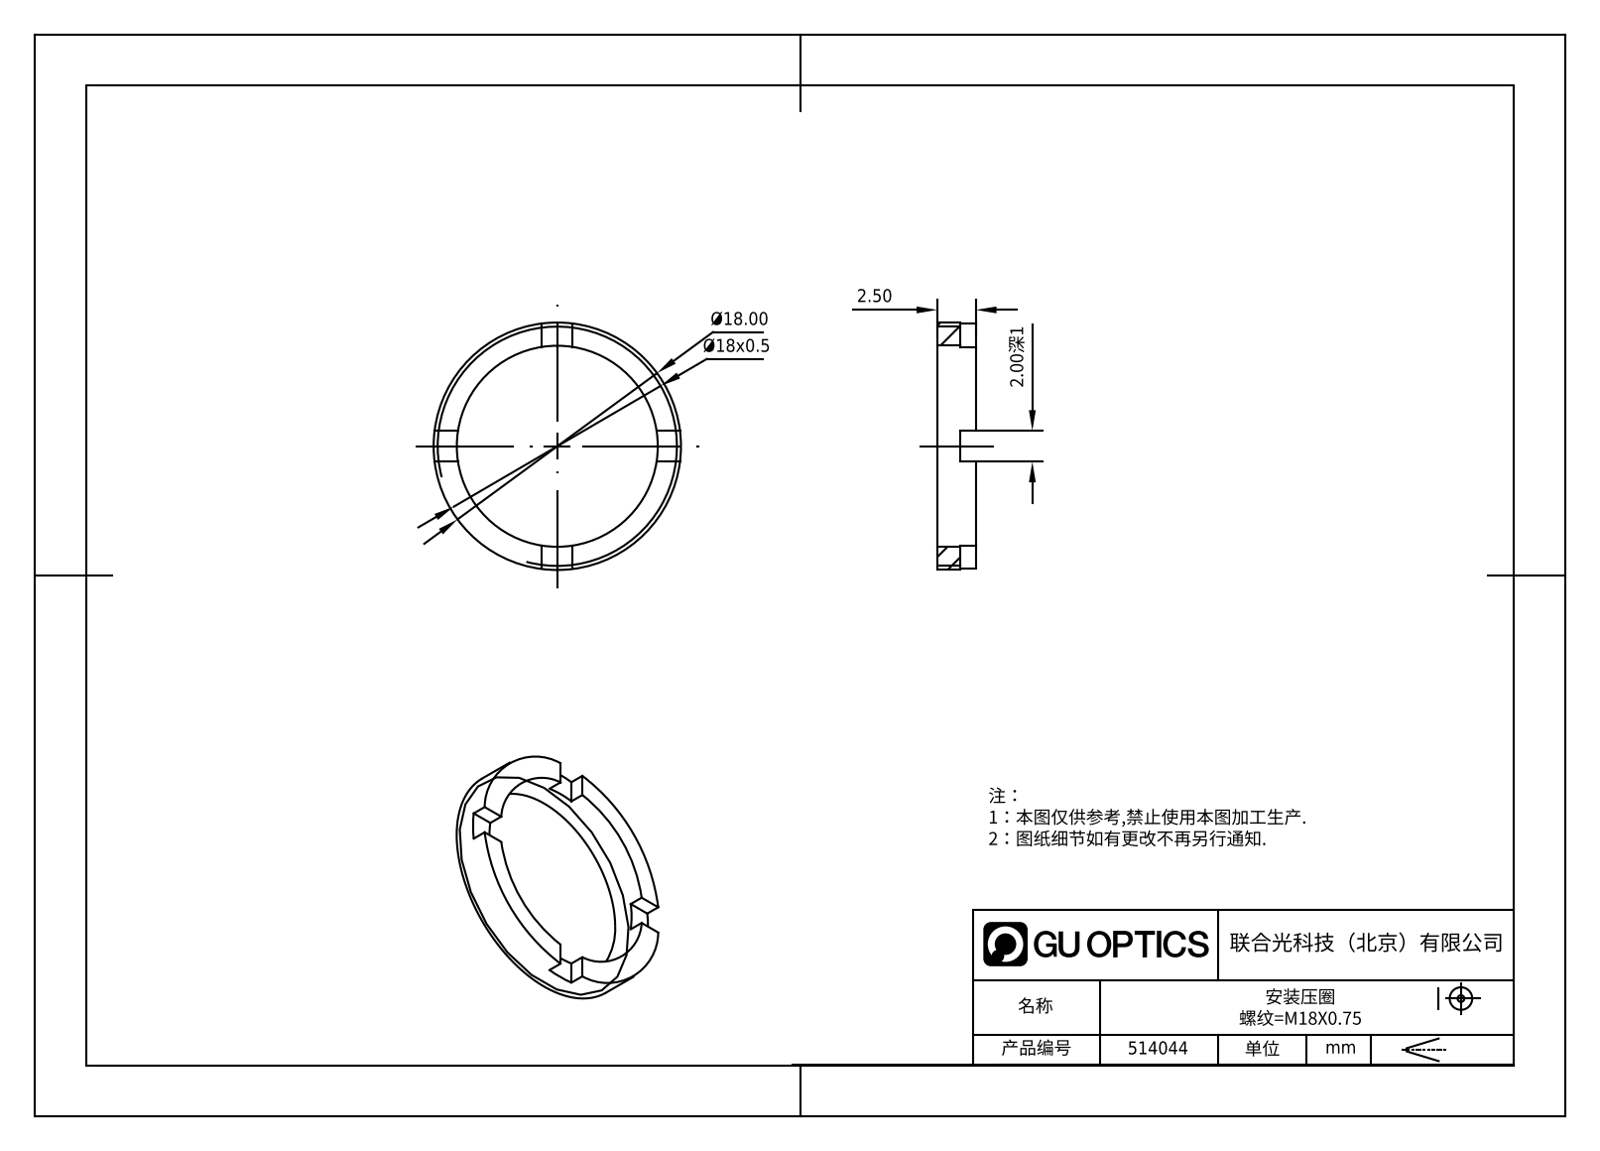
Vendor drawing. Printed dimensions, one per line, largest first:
Ø18.00
Ø18x0.5
2.50
2.00深1
